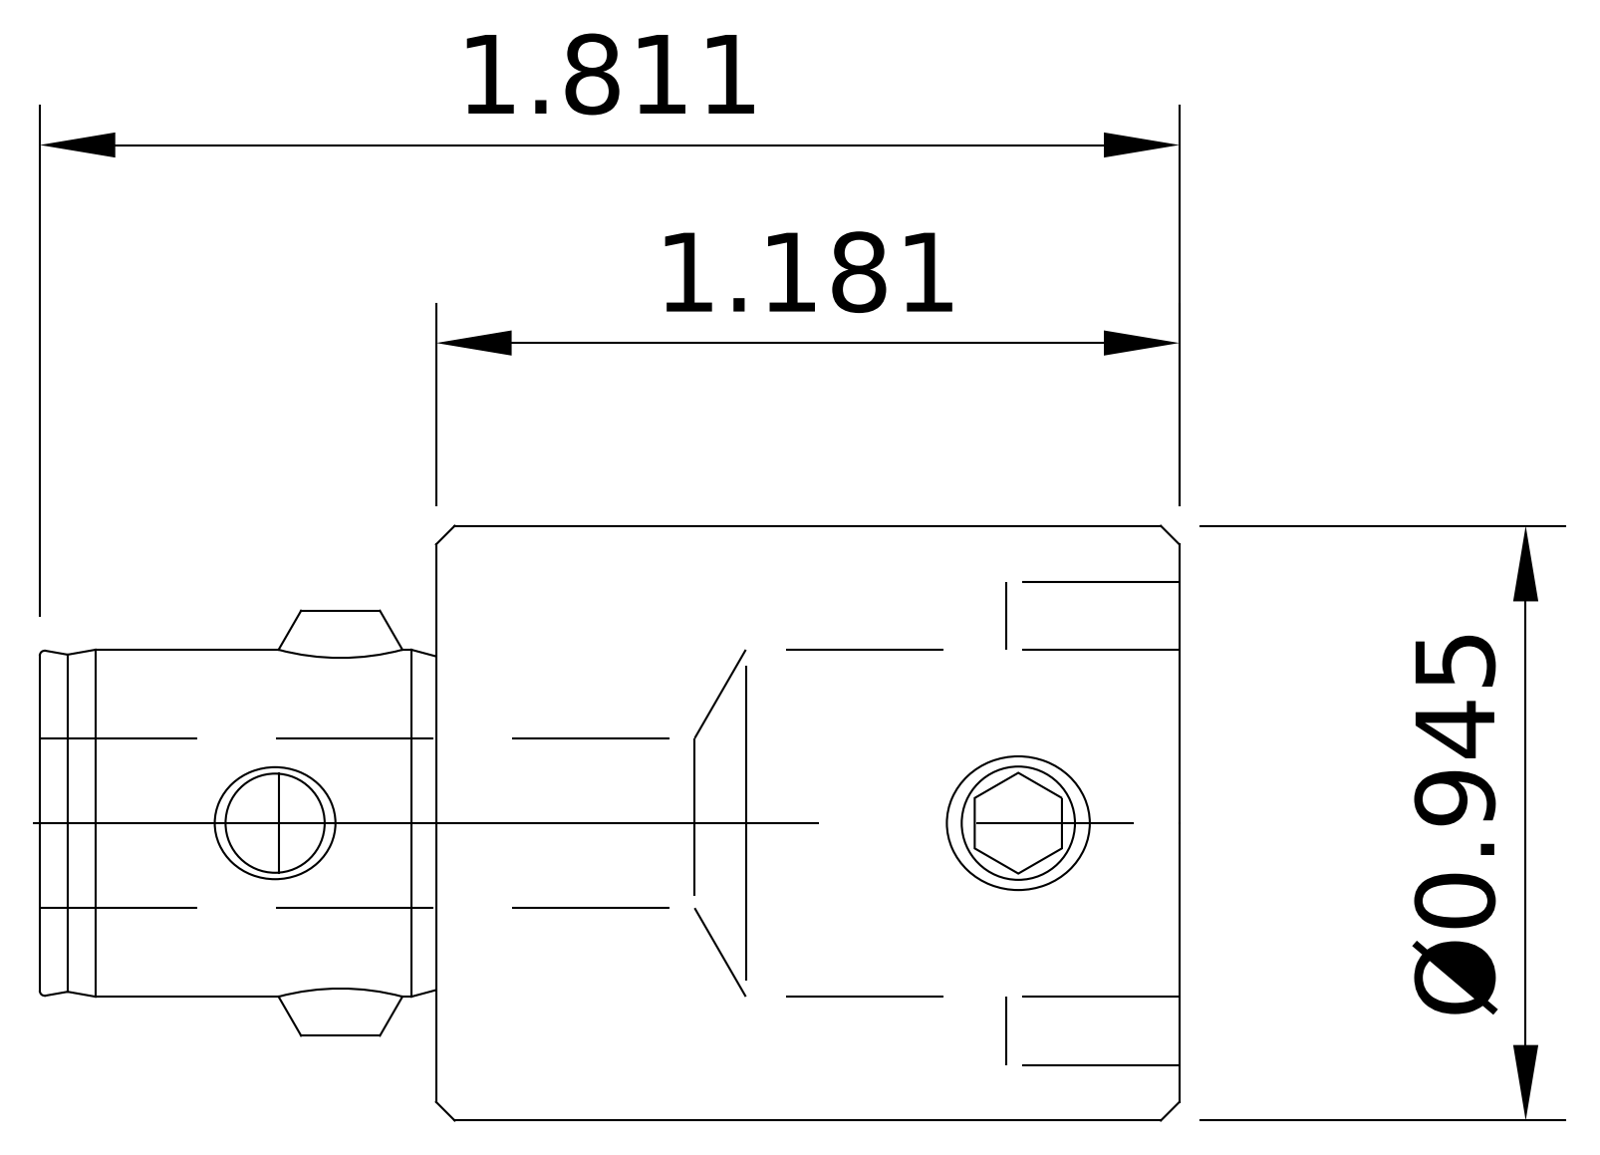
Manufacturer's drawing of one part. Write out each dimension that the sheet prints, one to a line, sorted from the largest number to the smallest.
1.811
1.181
Ø0.945
